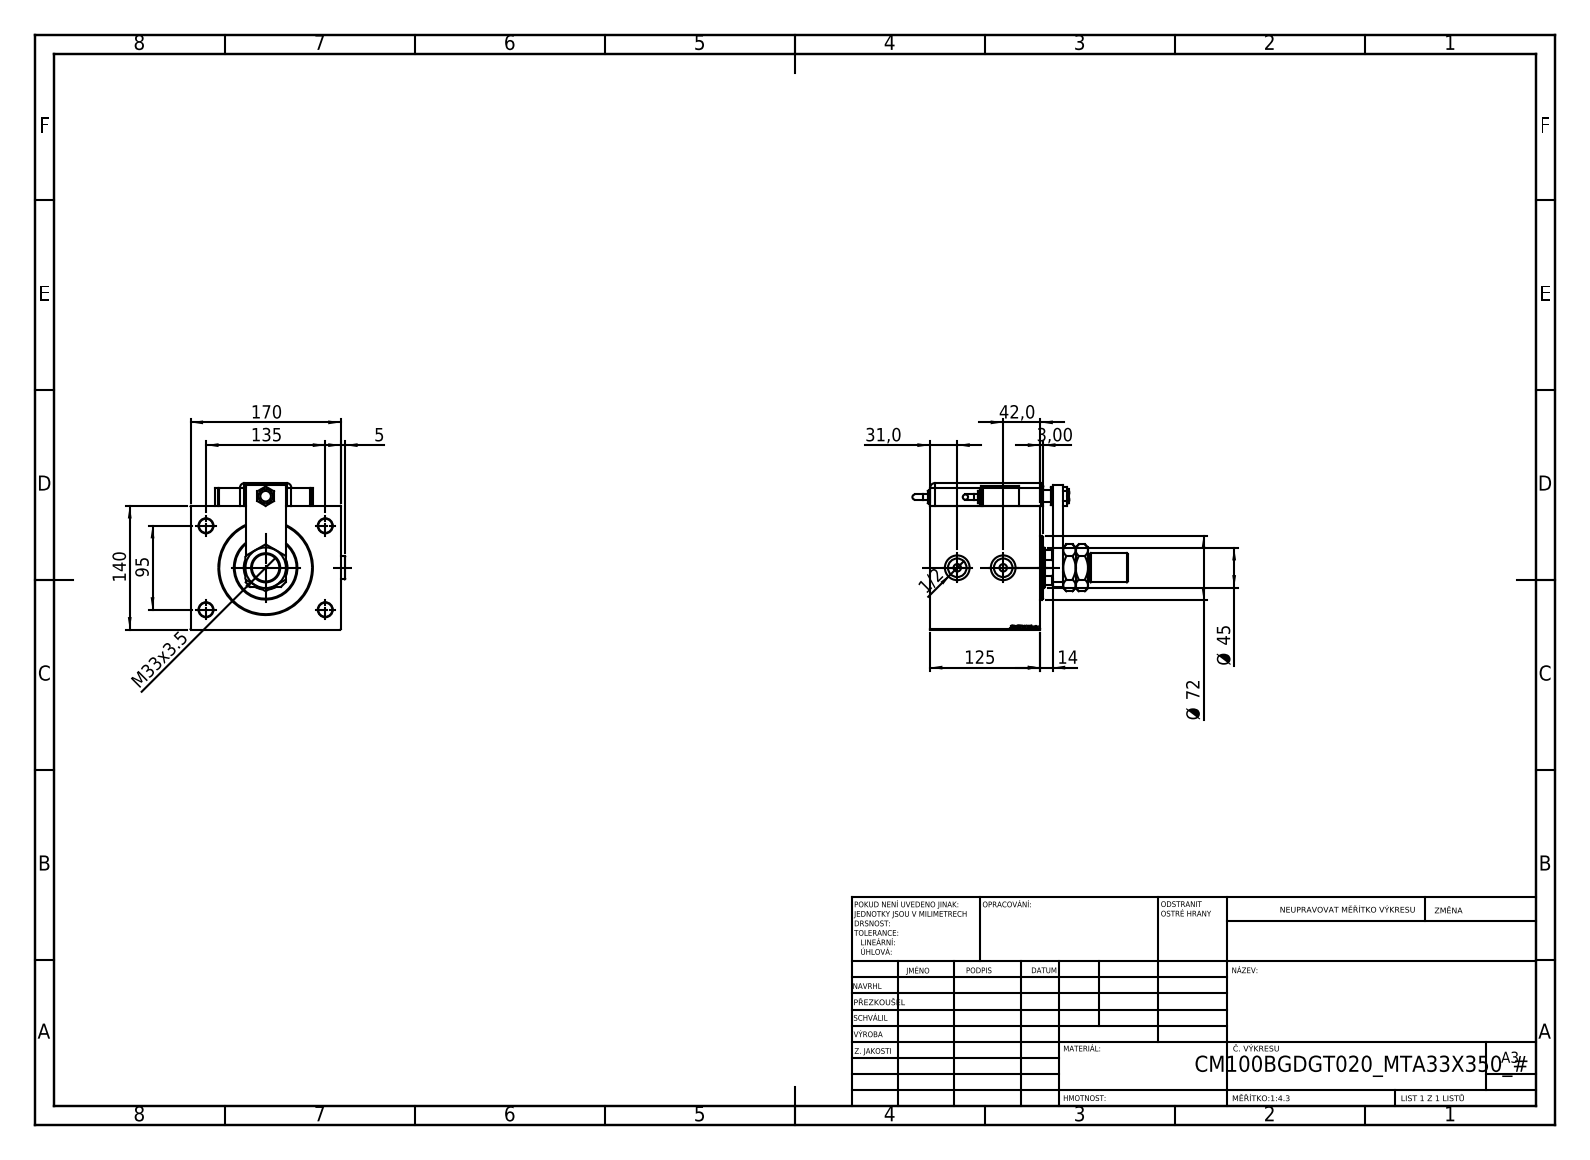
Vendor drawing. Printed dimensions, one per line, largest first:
170
140
135
125
95
Ø 72
Ø 45
42,0
M33x3.5
31,0
14
5
3,00
1/2
